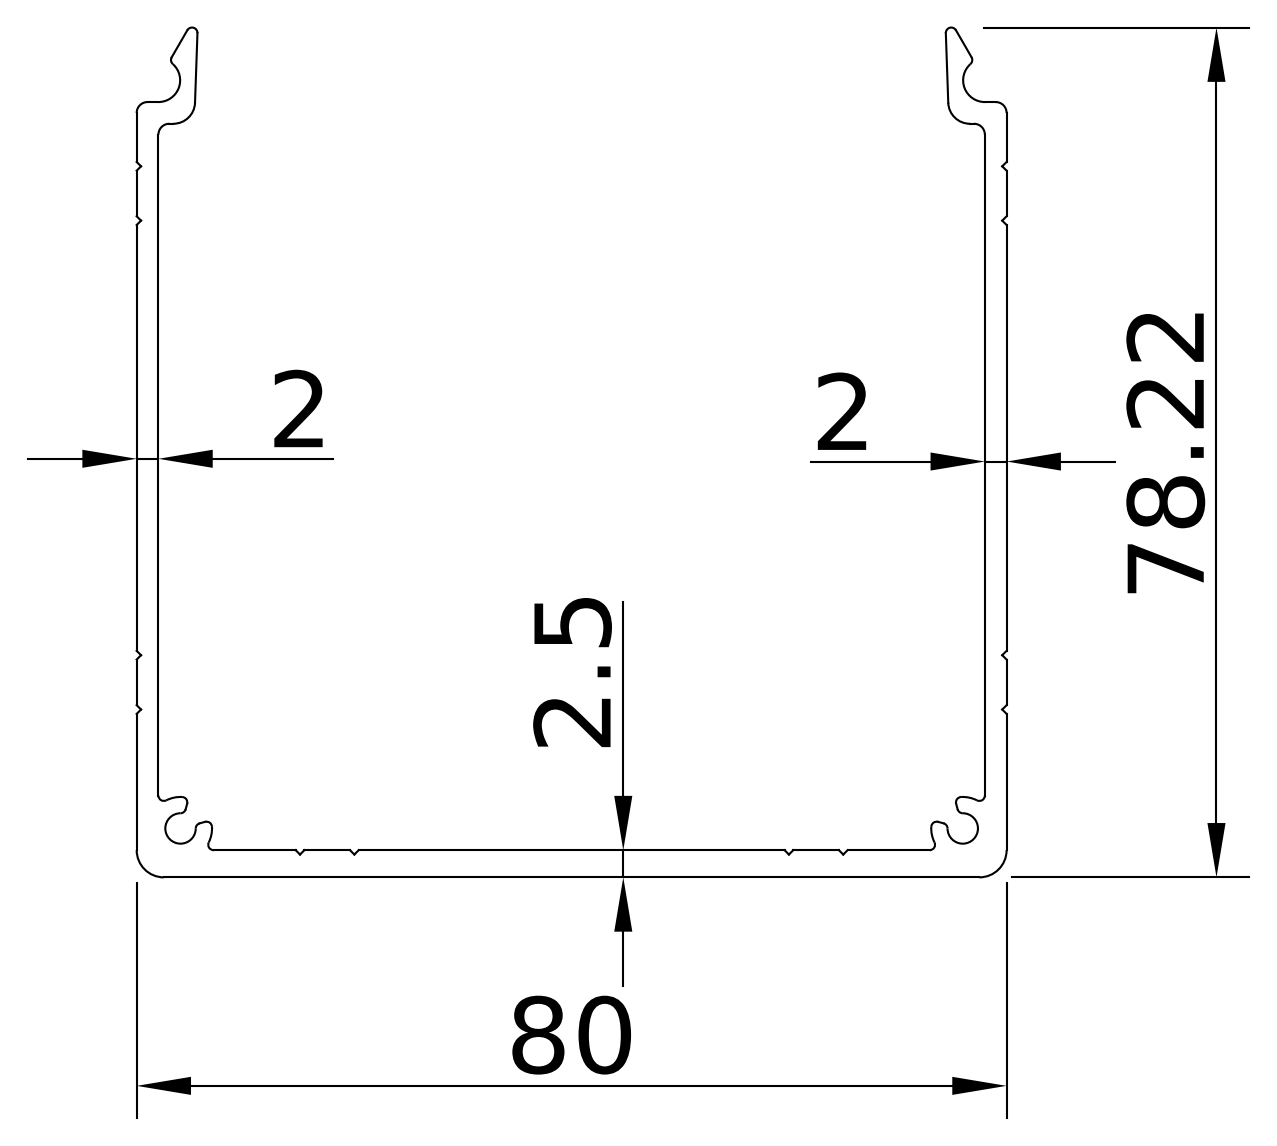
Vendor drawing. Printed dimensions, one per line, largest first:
80
78.22
2.5
2
2
